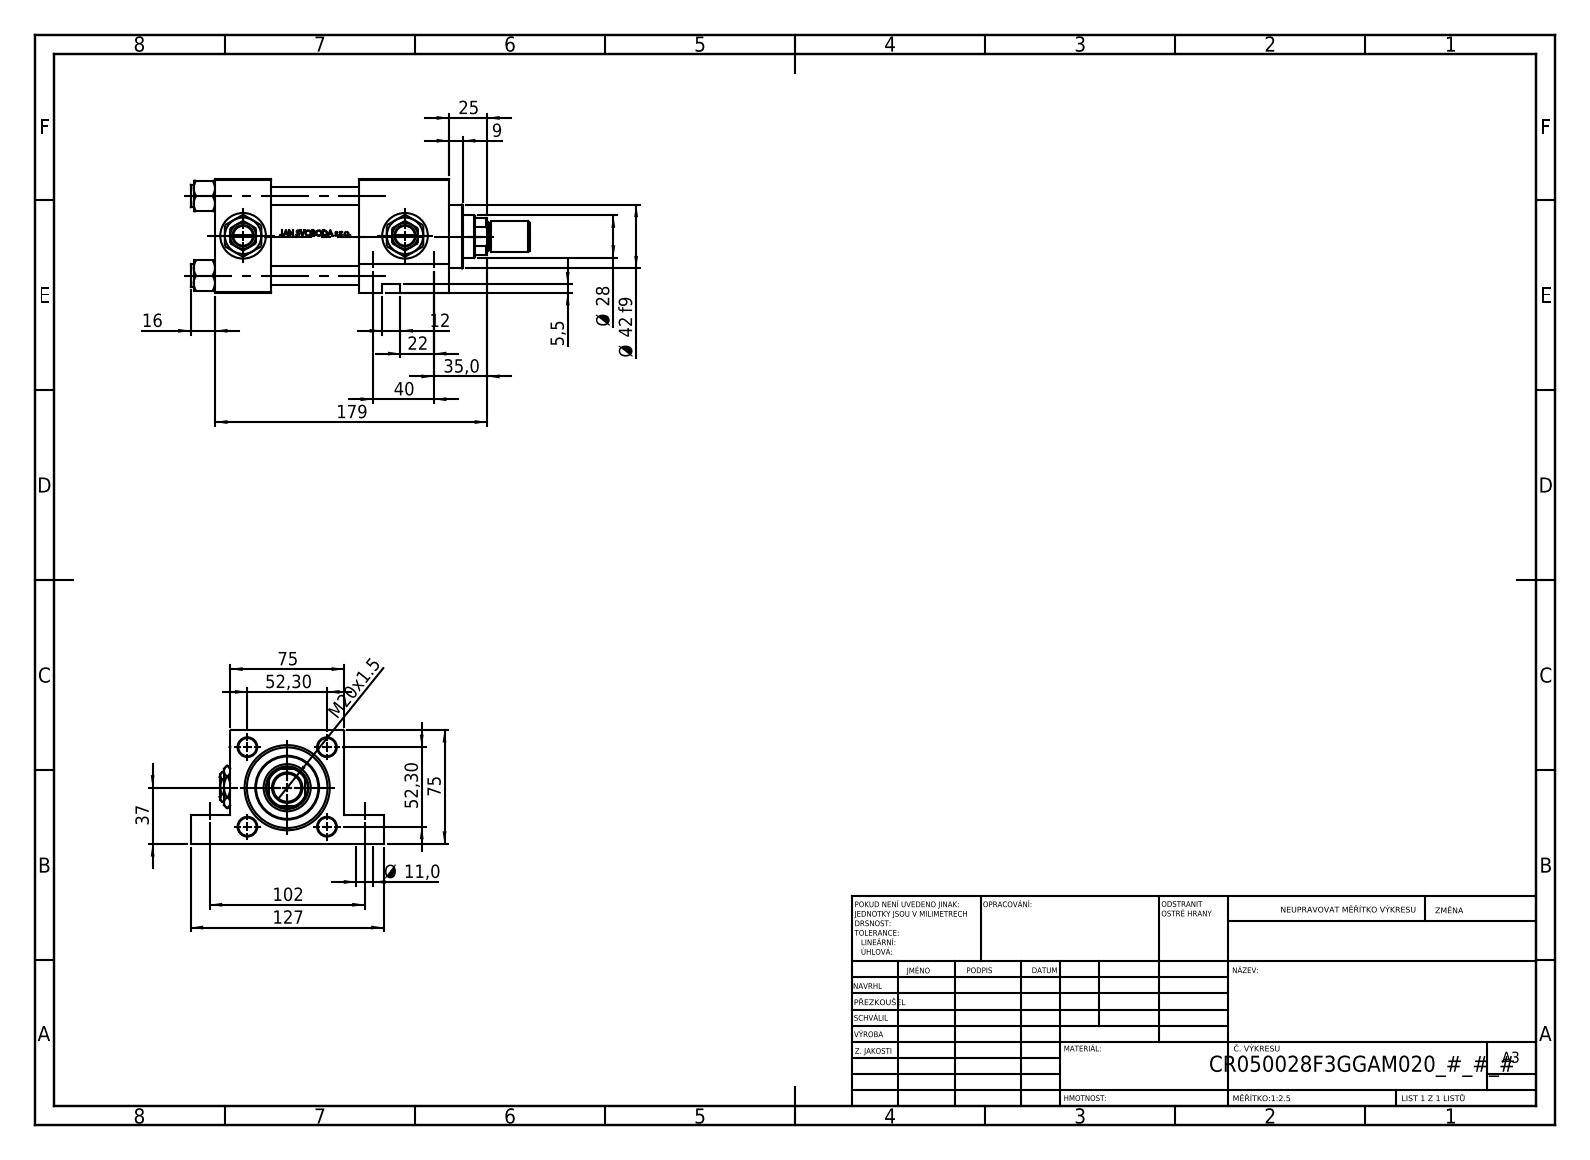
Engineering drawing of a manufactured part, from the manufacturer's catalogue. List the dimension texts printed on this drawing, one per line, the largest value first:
179
127
102
75
75
52,30
52,30
Ø 42 f9
40
37
35,0
Ø 28
25
22
M20x1.5
16
12
Ø 11,0
9
5,5
